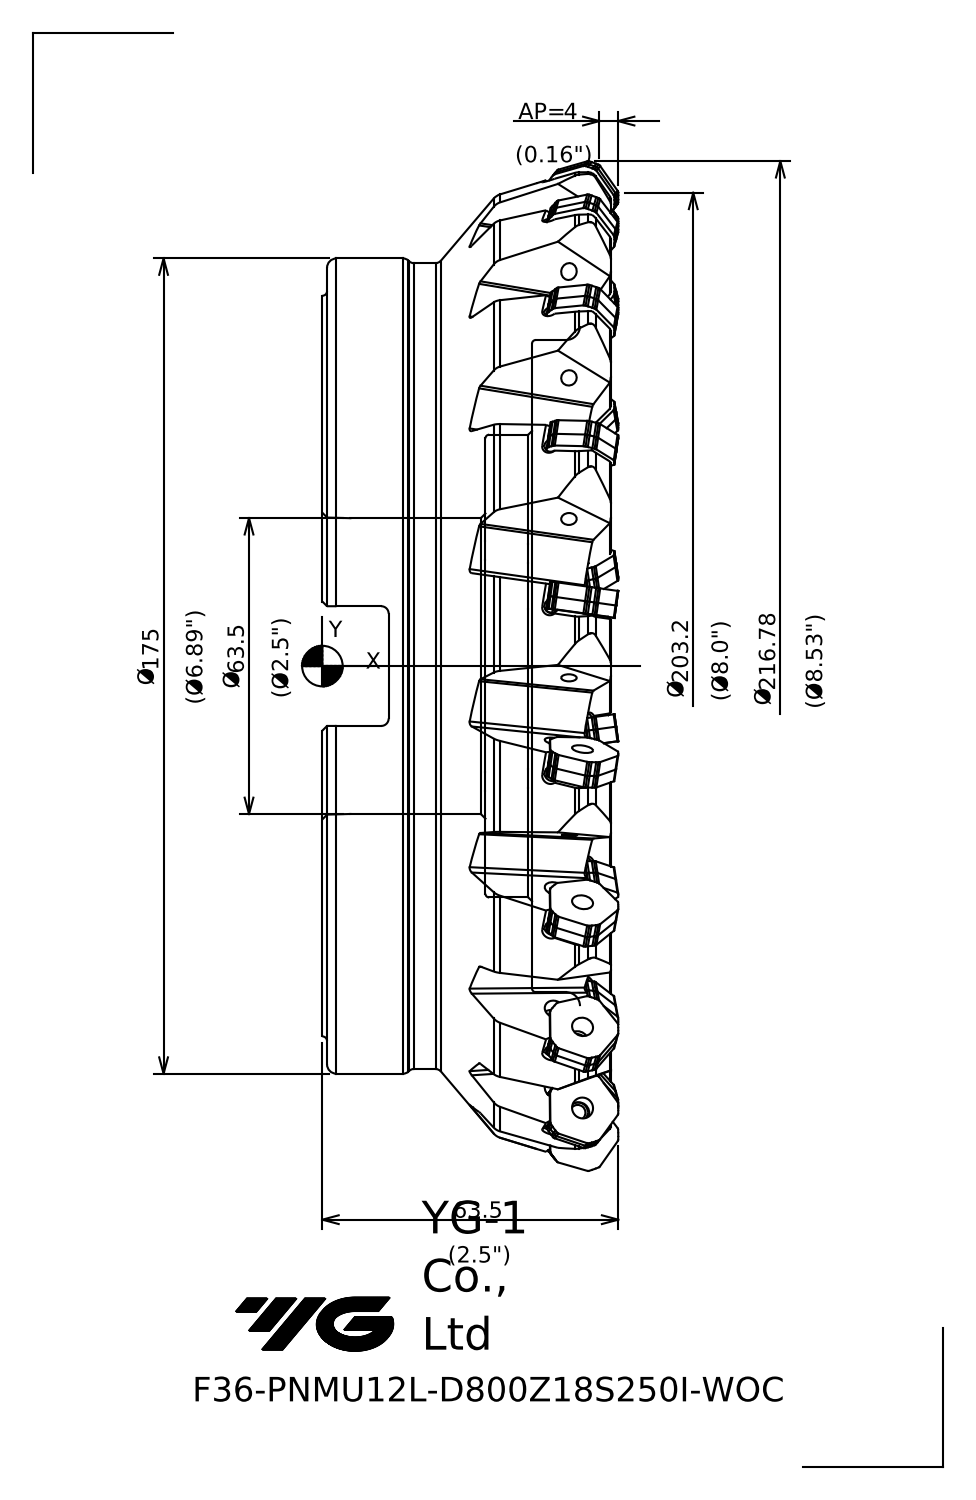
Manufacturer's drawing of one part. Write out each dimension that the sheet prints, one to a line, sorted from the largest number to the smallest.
216.78 Ø
203.2 Ø
175 Ø
63.5 Ø
63.5
AP= 4
